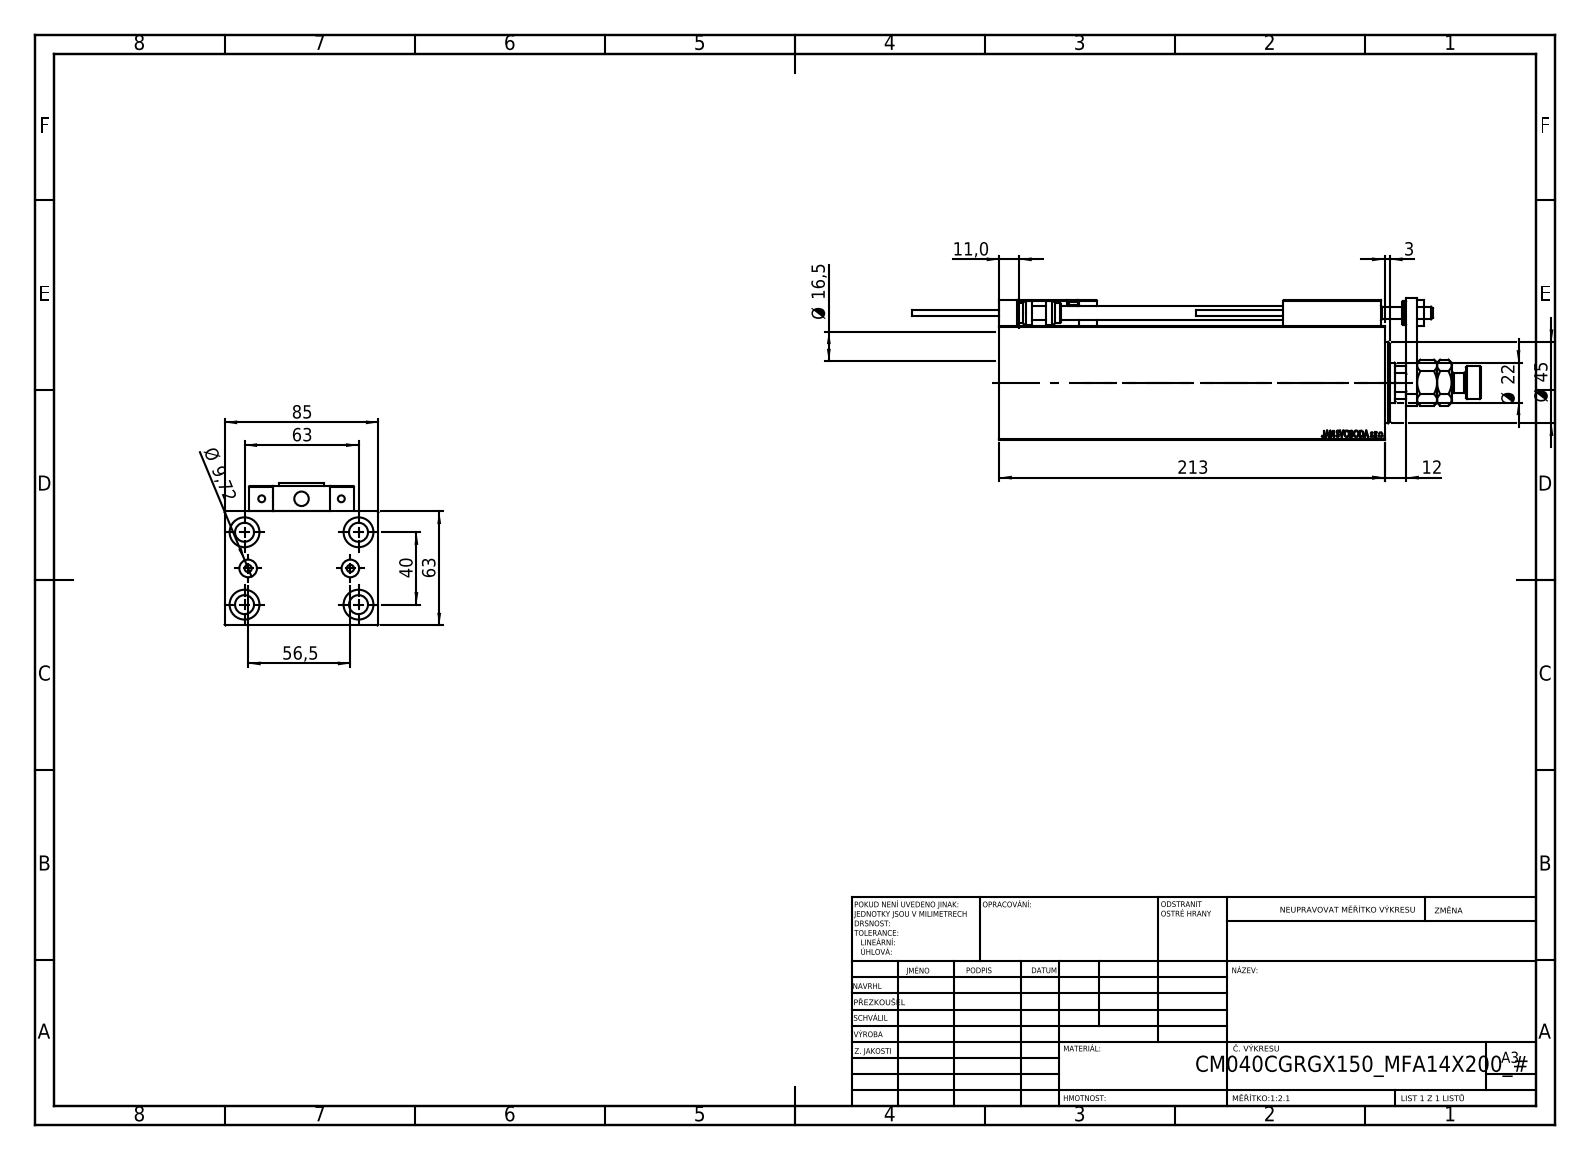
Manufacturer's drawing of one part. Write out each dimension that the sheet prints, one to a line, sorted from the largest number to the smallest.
213
85
63
63
56,5
Ø 45
40
Ø 22
Ø 16,5
12
11,0
Ø 9,72
3
